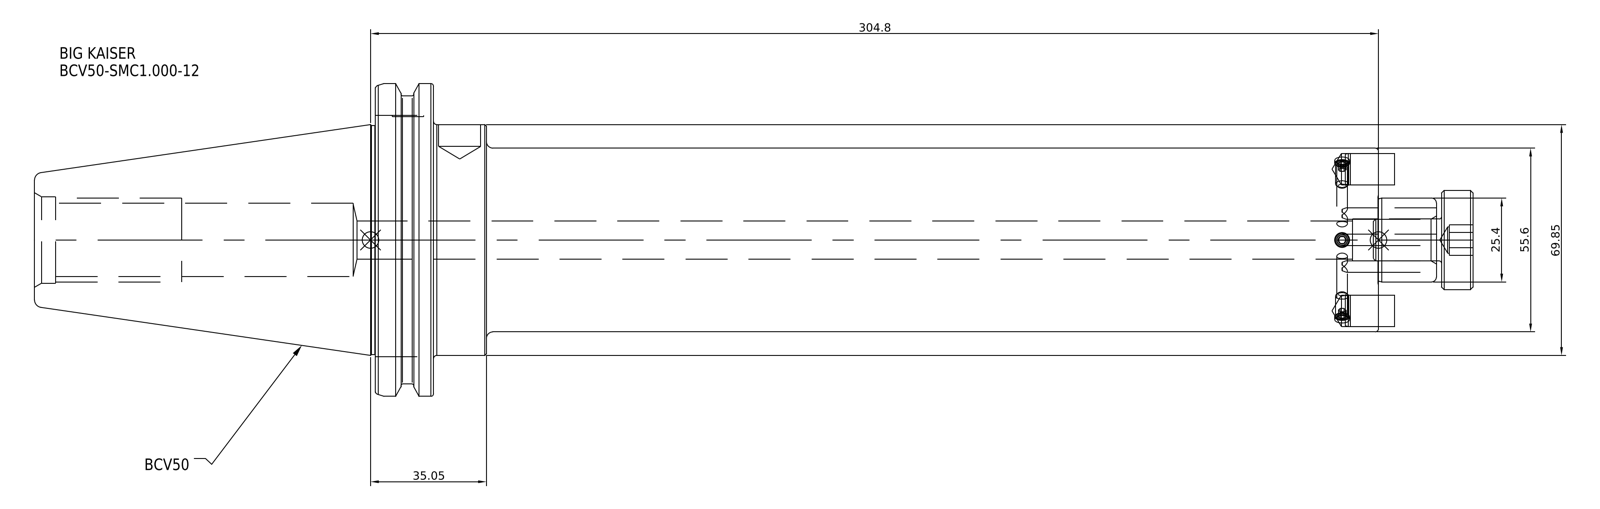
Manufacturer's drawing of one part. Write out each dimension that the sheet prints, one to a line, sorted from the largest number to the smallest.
304.8
69.85
55.6
35.05
25.4
